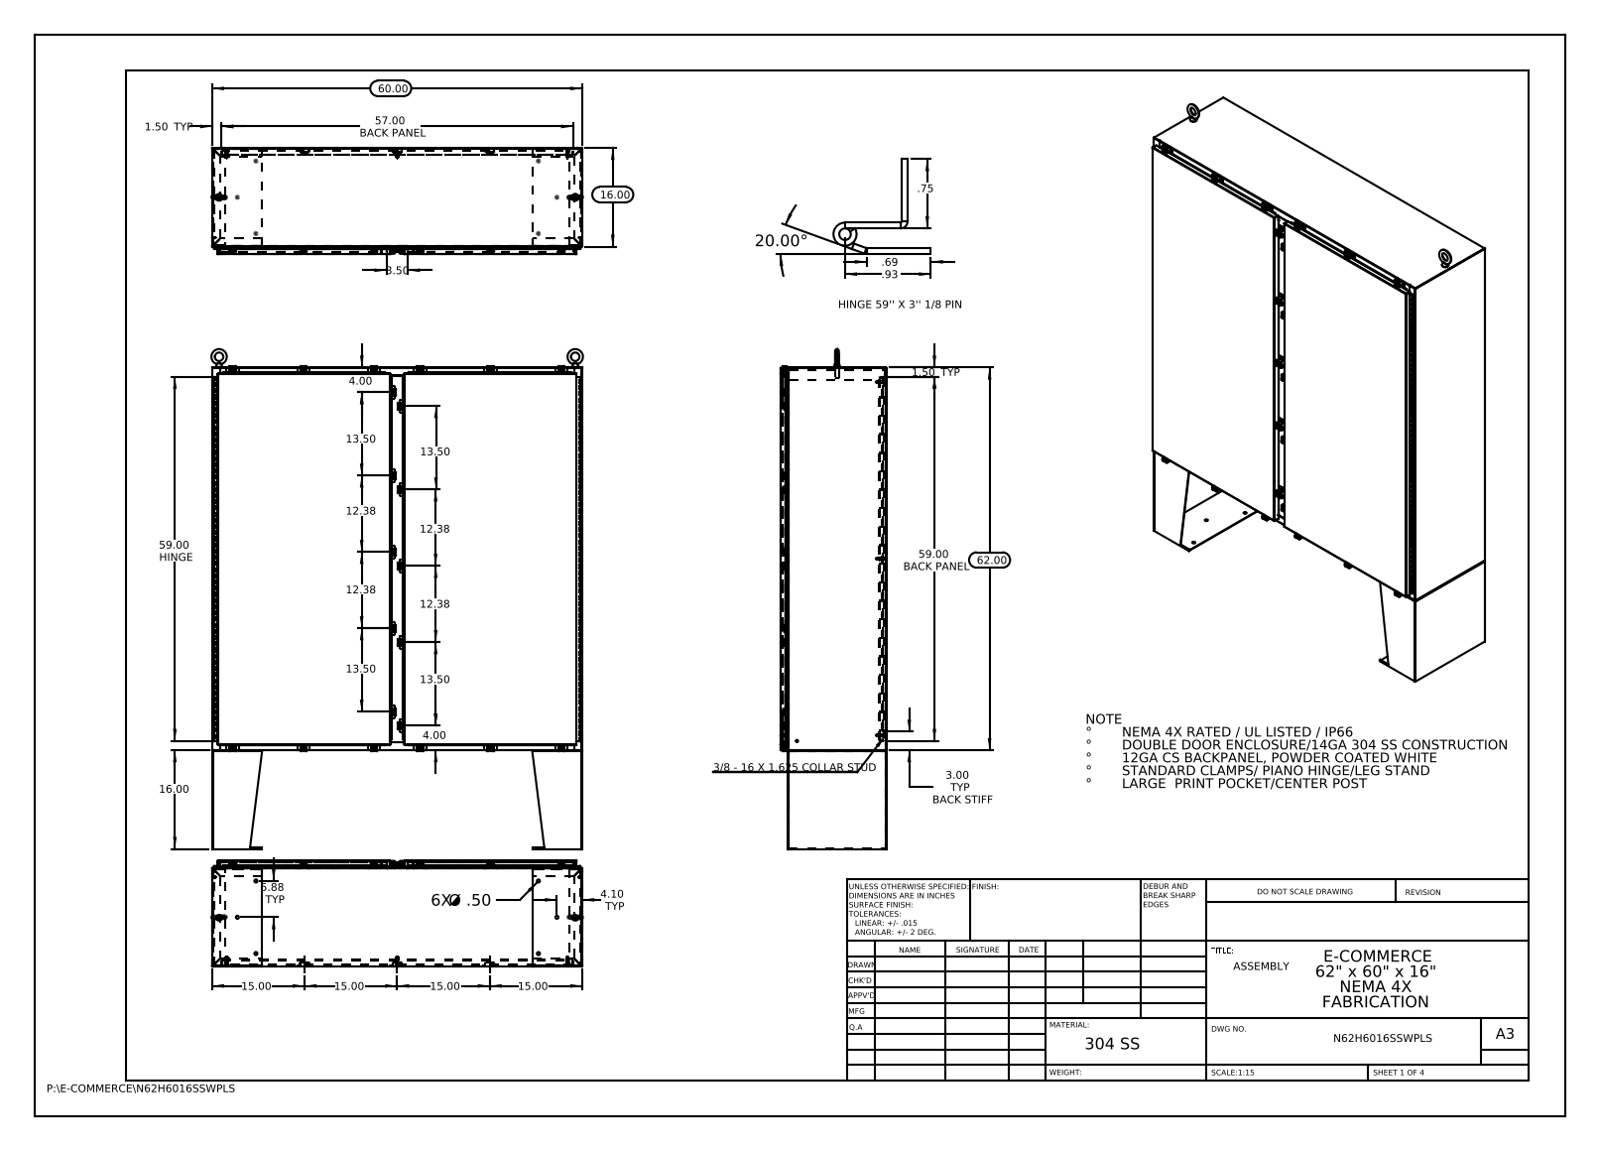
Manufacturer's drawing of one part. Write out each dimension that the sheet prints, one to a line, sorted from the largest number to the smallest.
62.00
60.00
59.00 HINGE
59.00 BACK PANEL
57.00 BACK PANEL
20.00°
16.00
16.00
15.00
15.00
15.00
15.00
13.50
13.50
13.50
13.50
12.38
12.38
12.38
12.38
5.88 TYP
4.10 TYP
4.00
4.00
3.50
3.00 TYP BACK STIFF
1.50 TYP
1.50 TYP
.93
.75
.69
6X Ø .50
